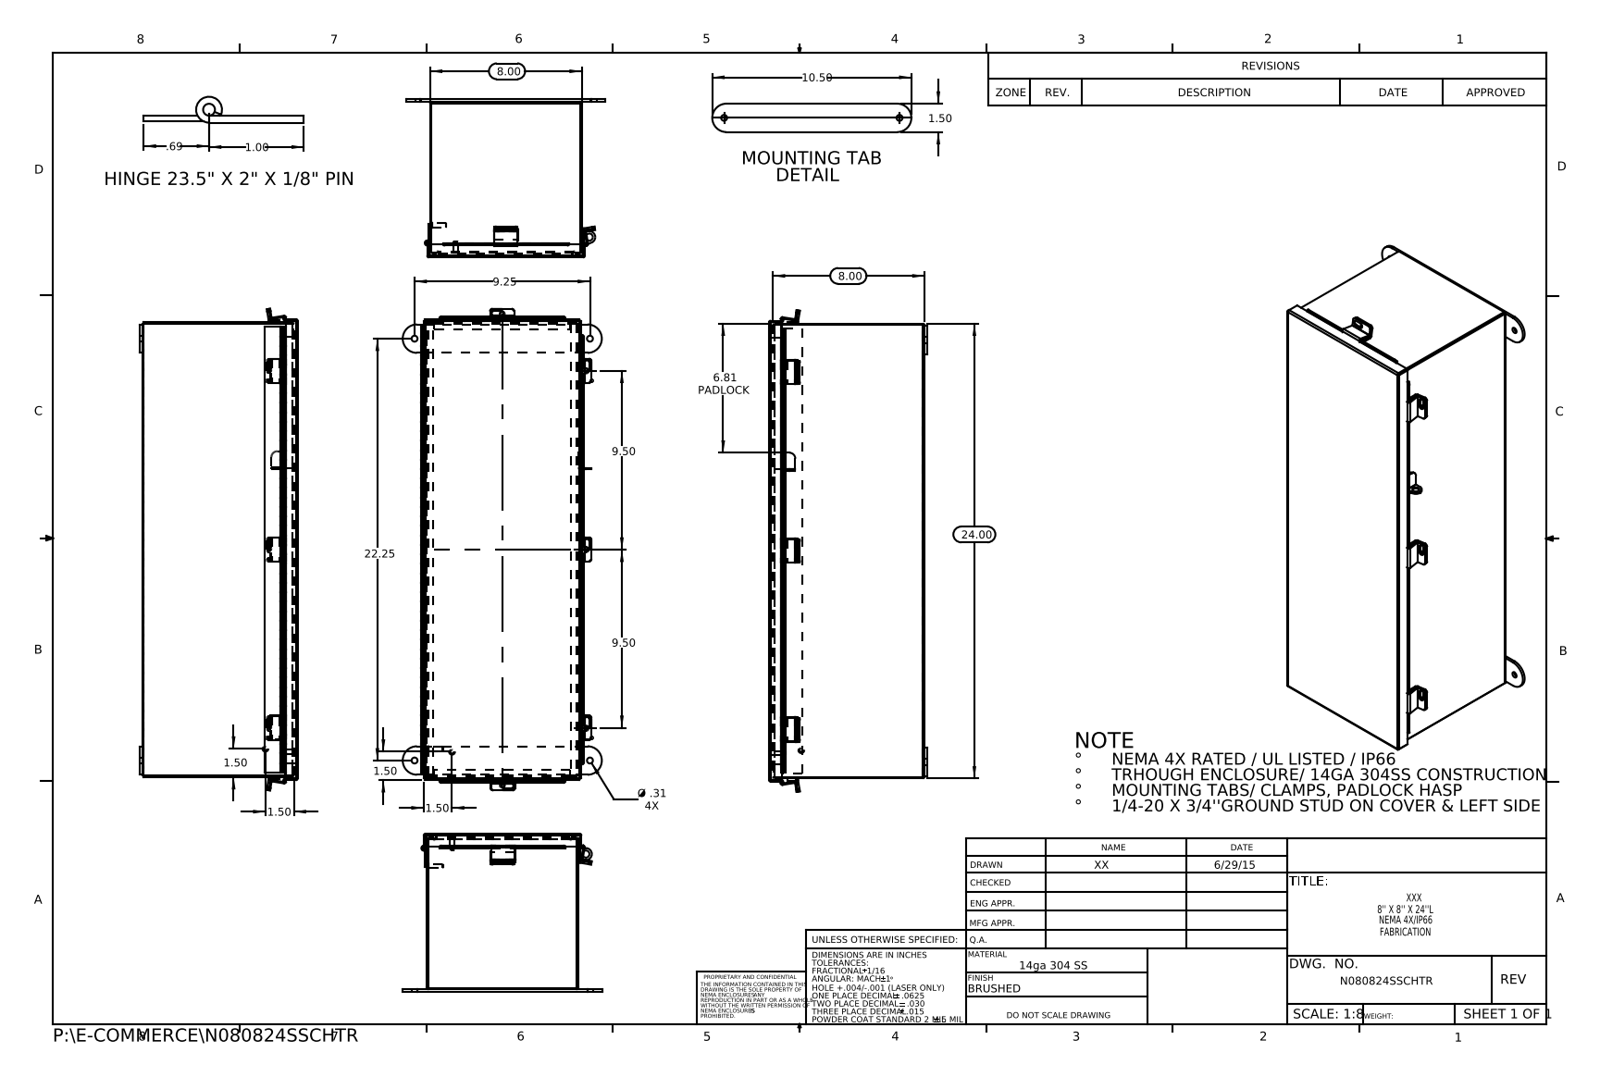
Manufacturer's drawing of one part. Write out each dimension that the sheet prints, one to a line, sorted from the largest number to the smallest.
24.00
22.25
10.50
9.50
9.50
9.25
8.00
8.00
6.81 PADLOCK
1.50
1.50
1.50
1.50
1.50
1.00
.69
Ø .31 4X
